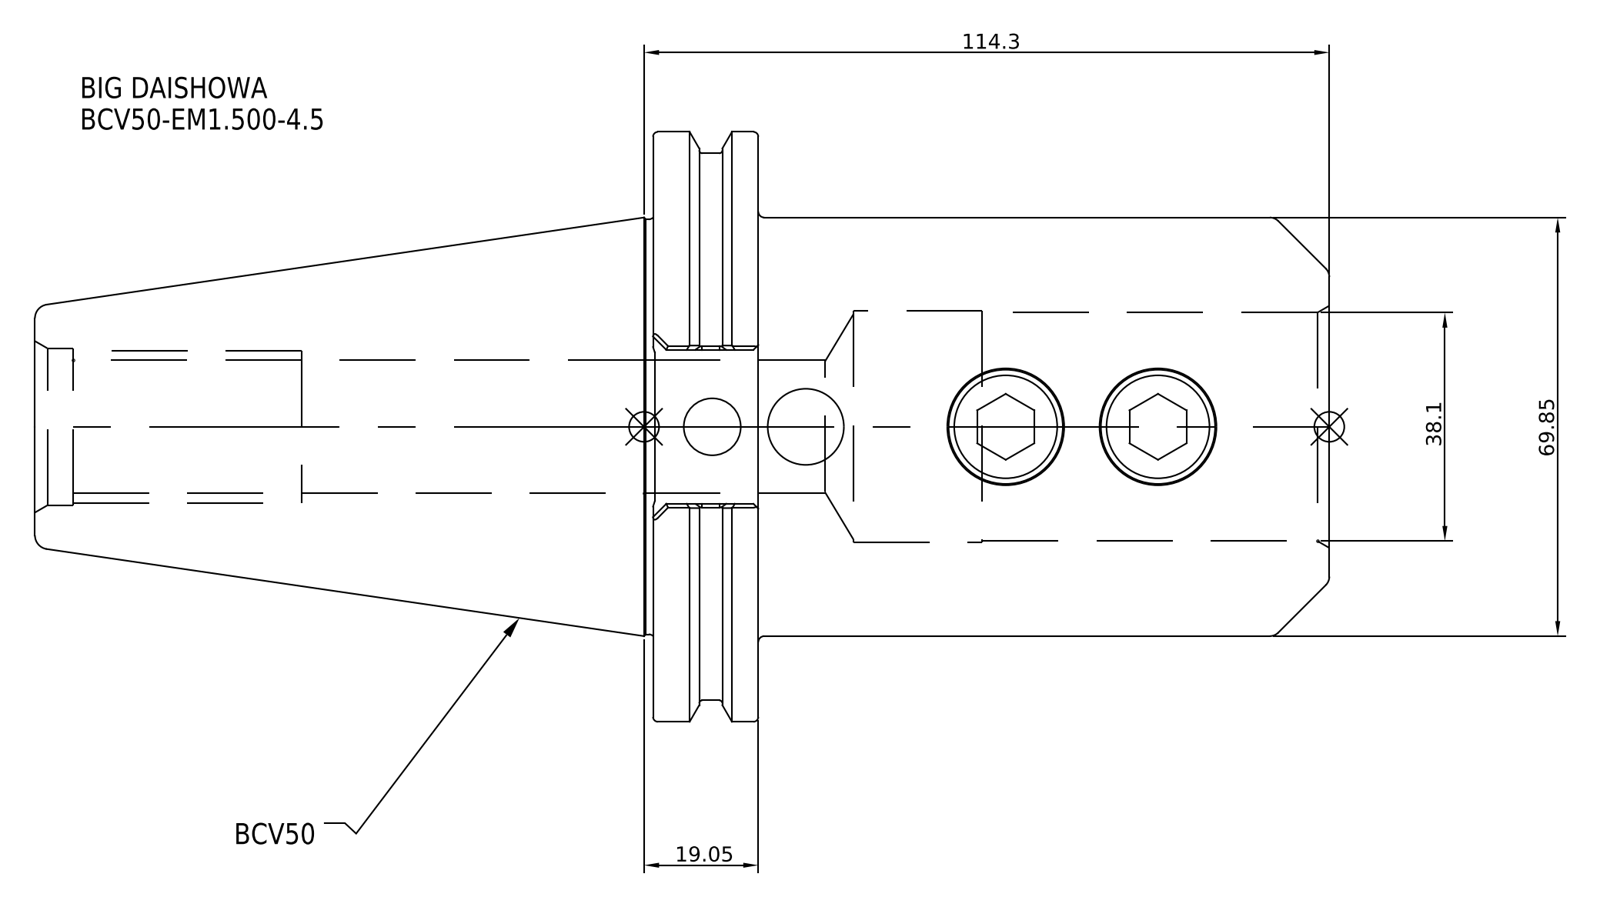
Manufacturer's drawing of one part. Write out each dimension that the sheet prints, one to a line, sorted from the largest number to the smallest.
114.3
69.85
38.1
19.05
